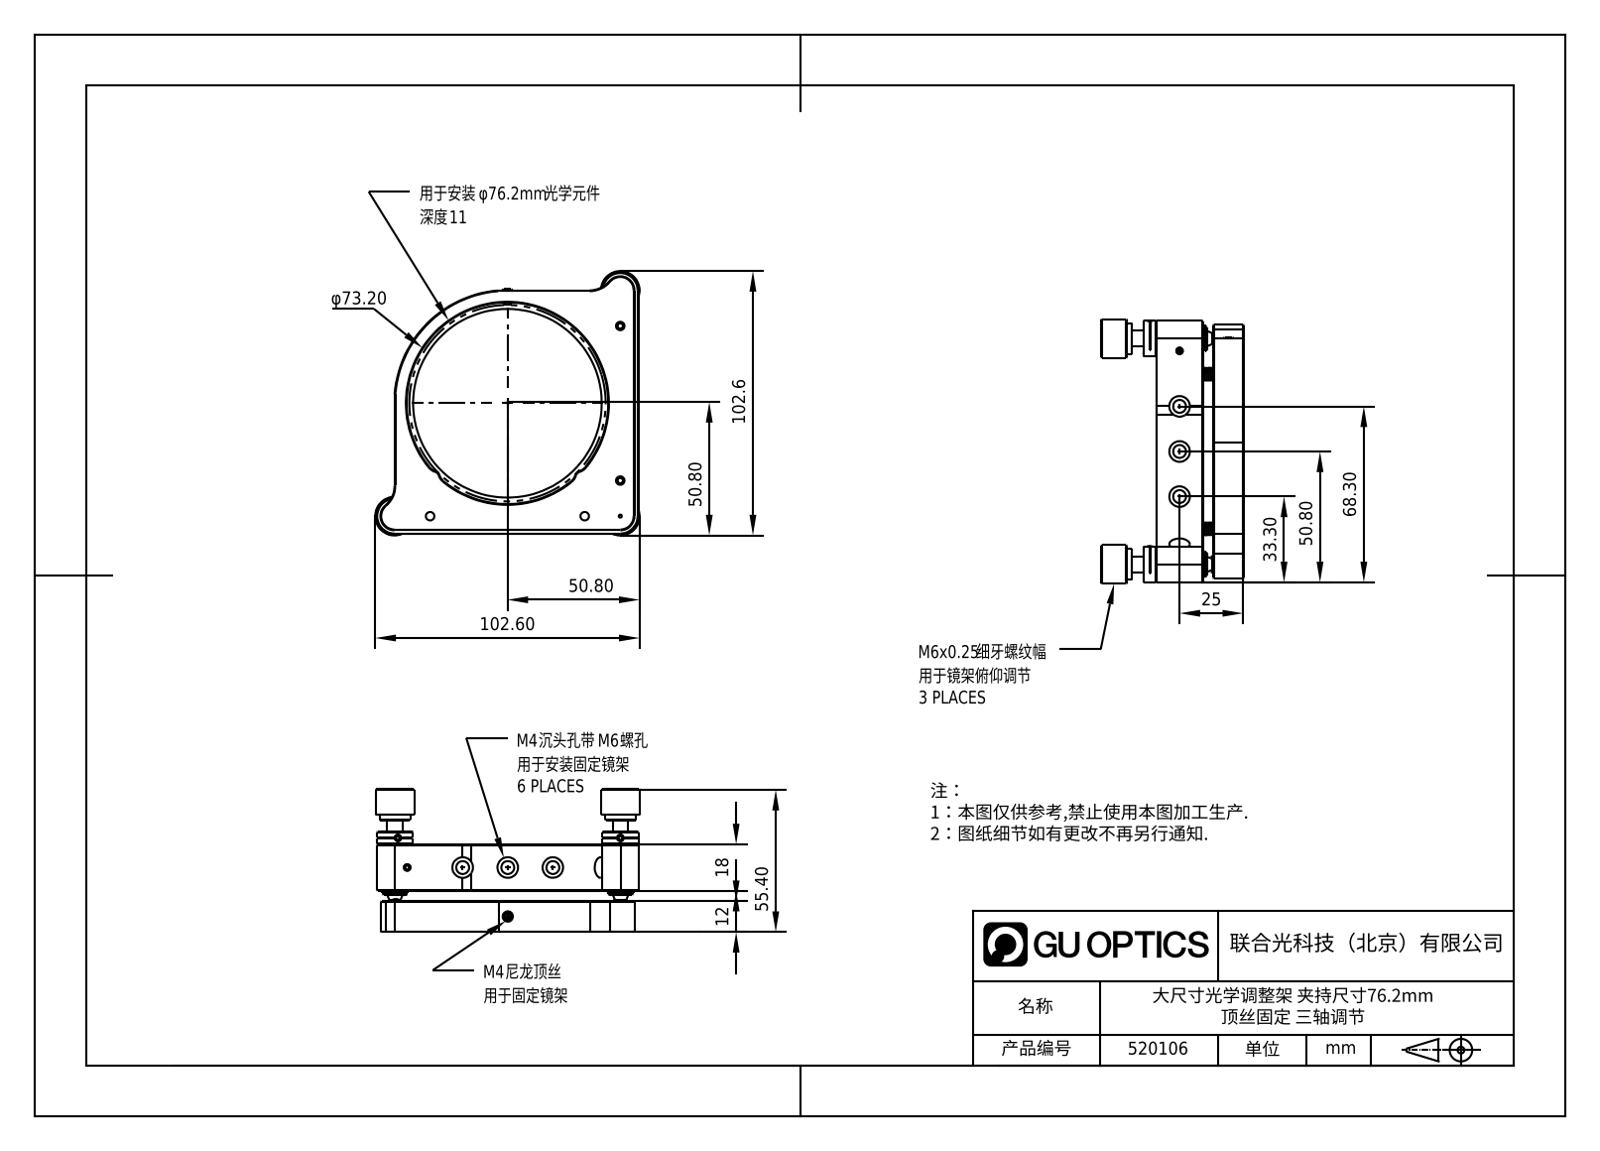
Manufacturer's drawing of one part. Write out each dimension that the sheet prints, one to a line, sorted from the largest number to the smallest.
102.6
102.60
68.30
55.40
50.80
50.80
50.80
33.30
25
18
12
